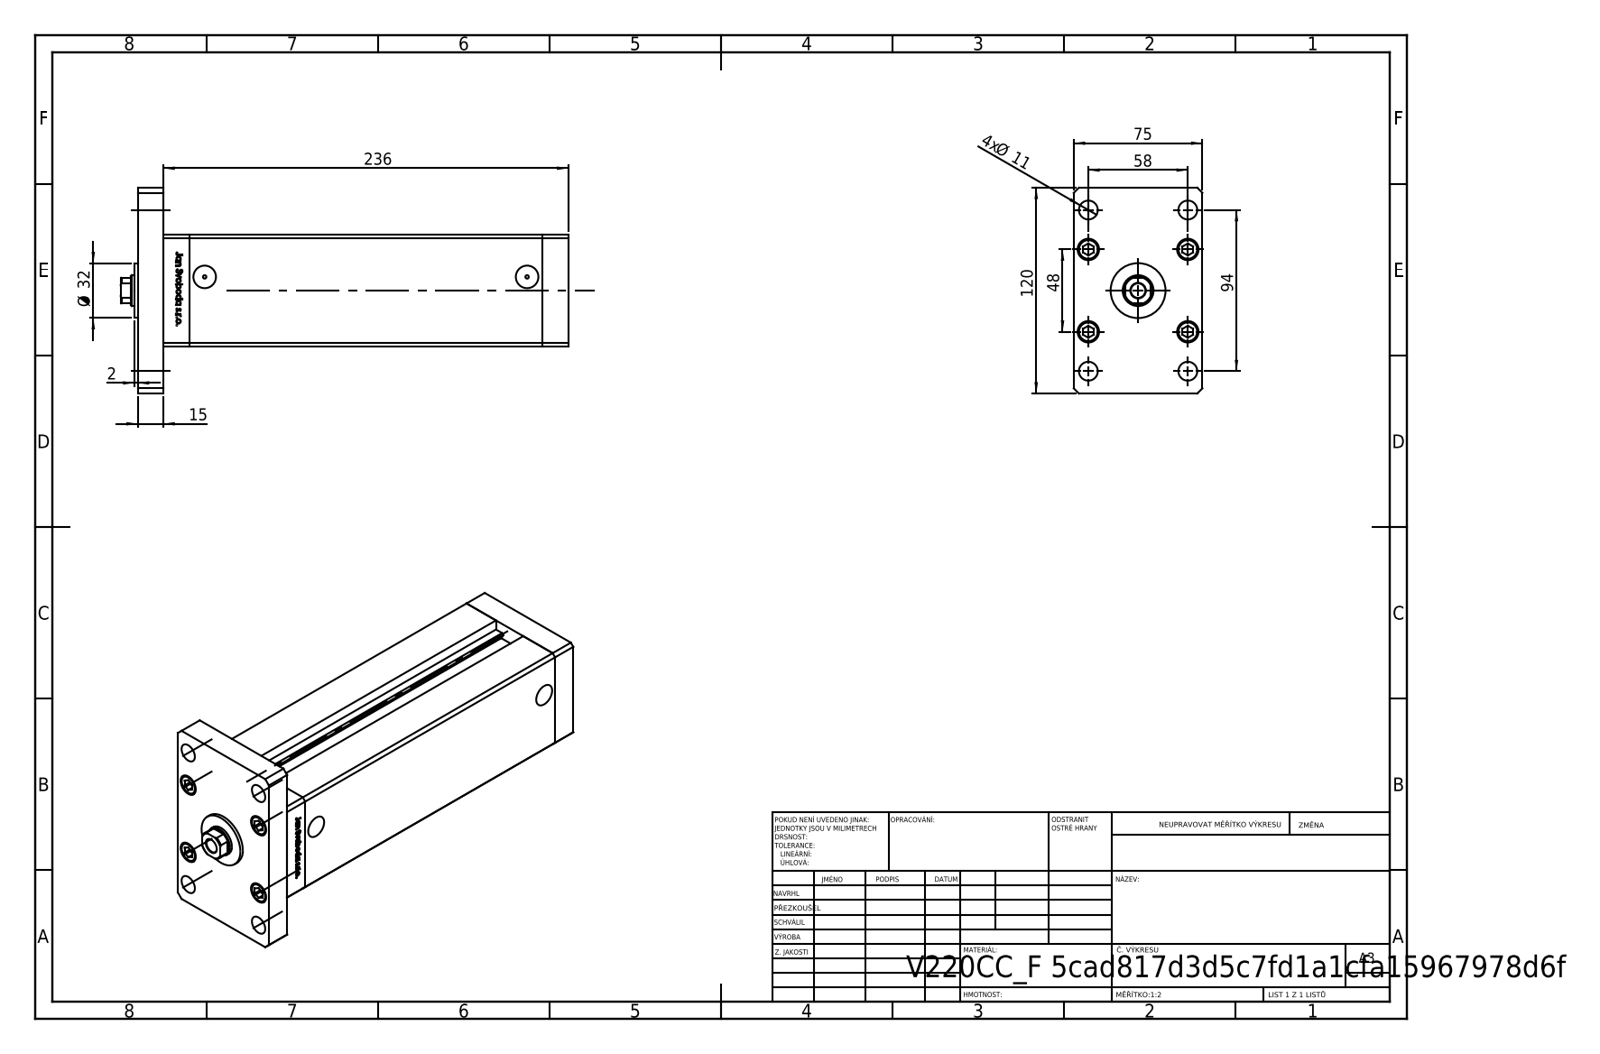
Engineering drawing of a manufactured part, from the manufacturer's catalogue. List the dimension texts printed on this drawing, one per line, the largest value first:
236
120
94
75
58
48
Ø 32
15
4x Ø 11
2
